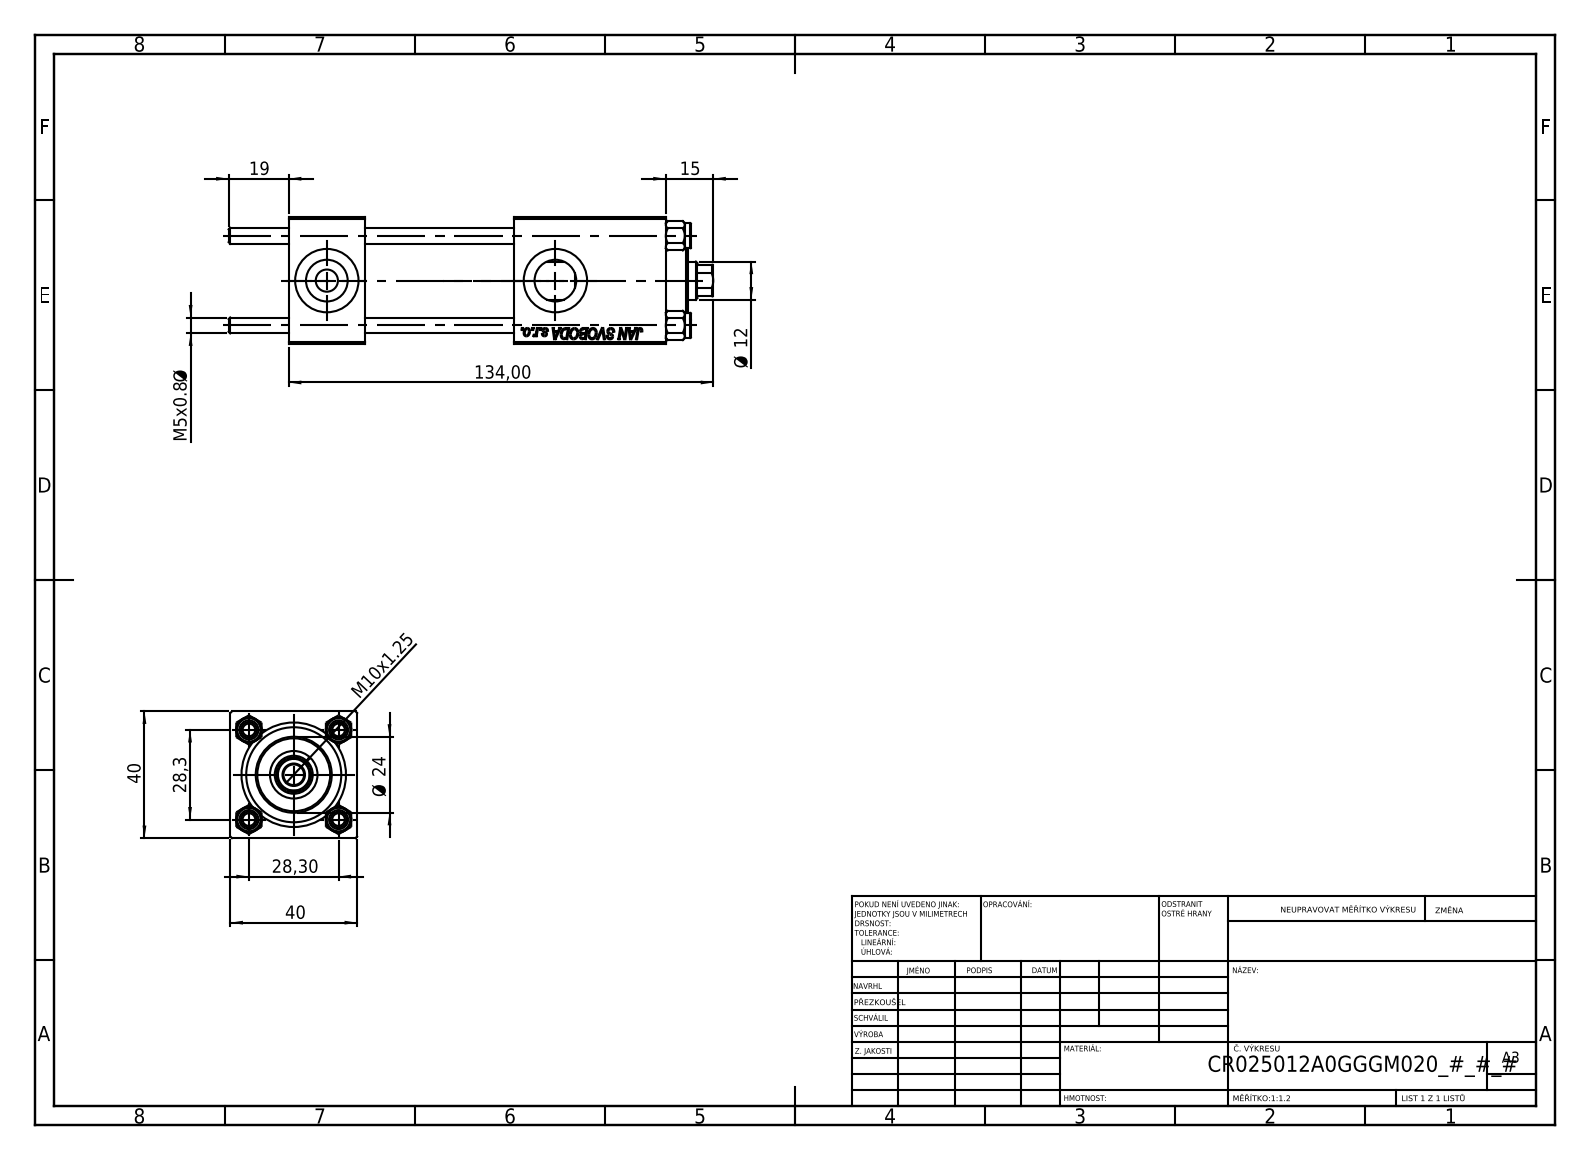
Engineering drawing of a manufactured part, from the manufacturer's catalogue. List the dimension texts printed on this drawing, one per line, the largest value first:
134,00
40
40
28,3
28,30
Ø 24
19
15
Ø 12
M10x1.25
M5x0.8 Ø
